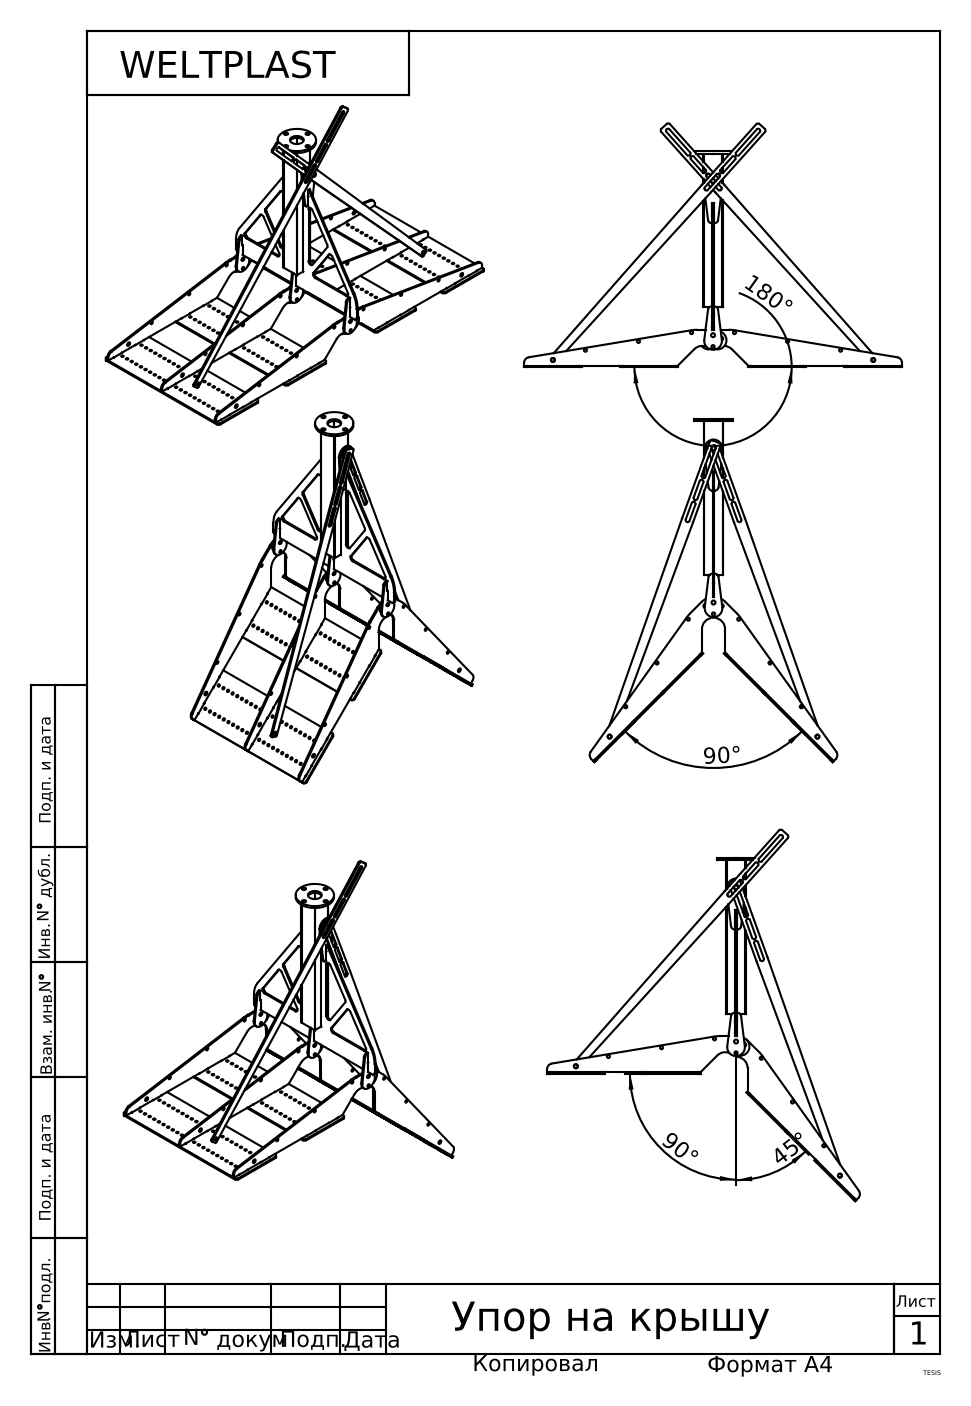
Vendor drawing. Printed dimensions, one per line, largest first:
180°
90°
90°
45°
